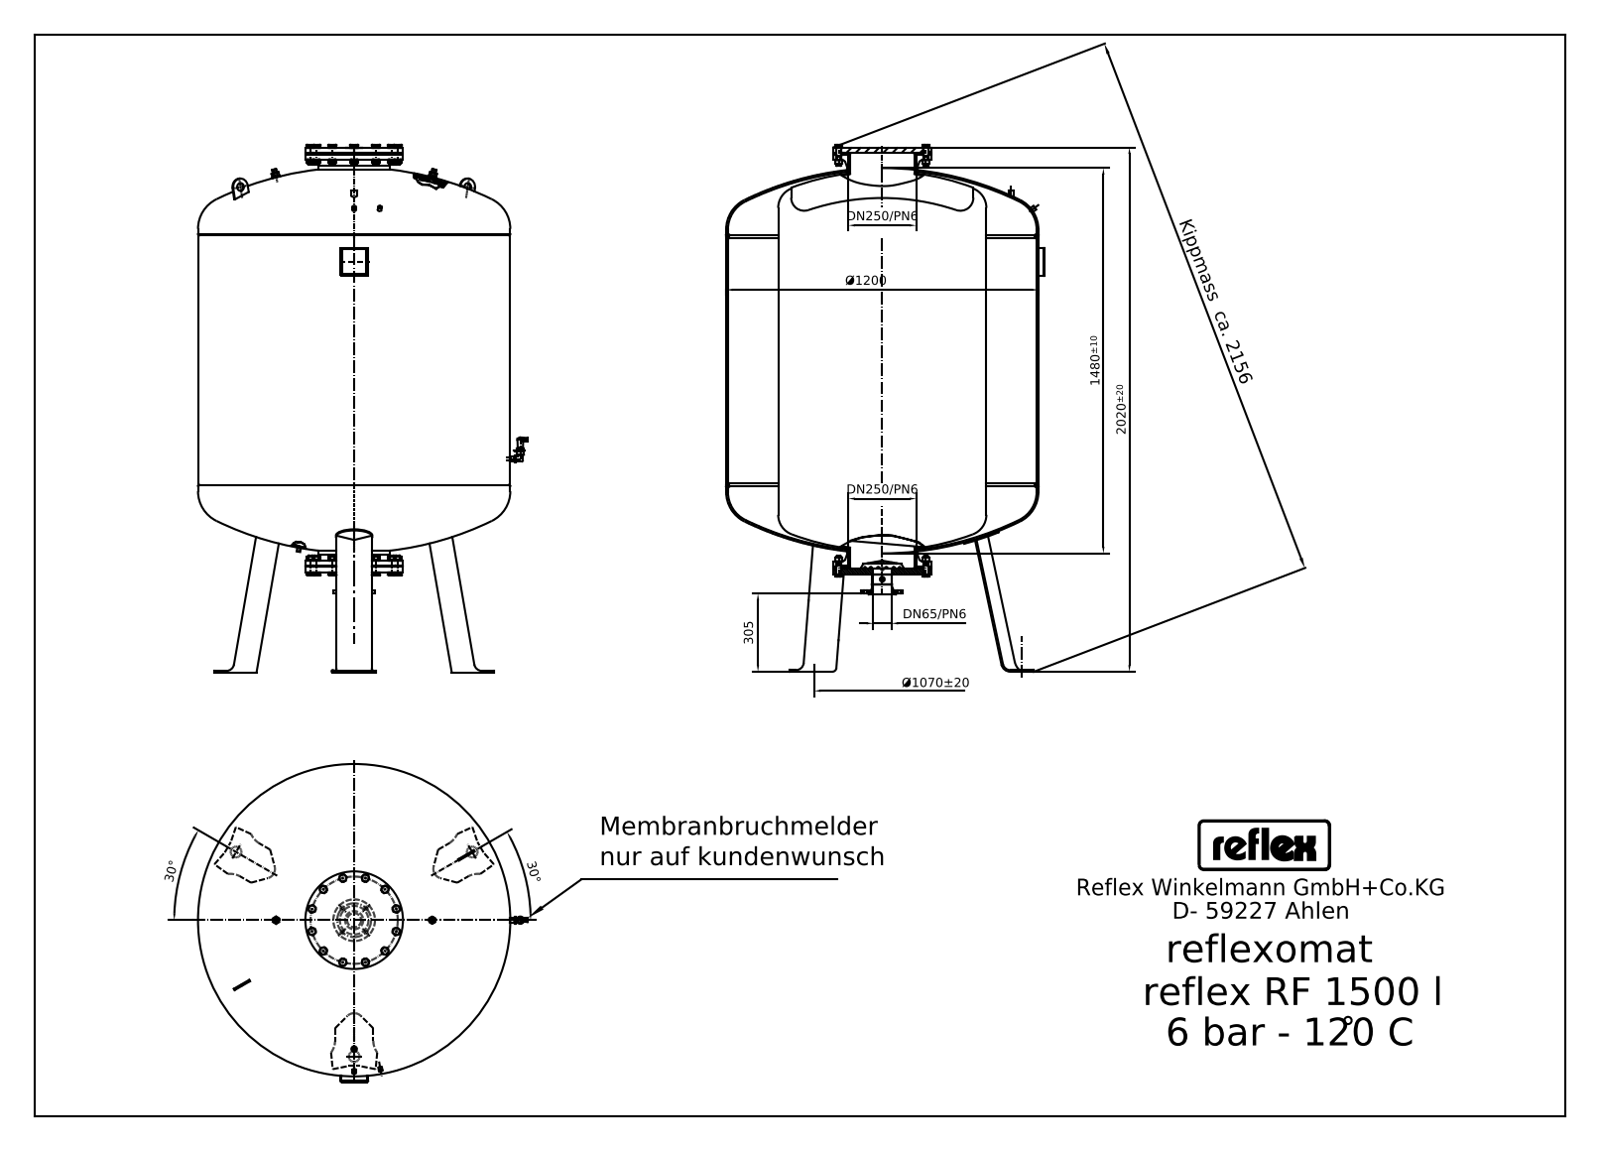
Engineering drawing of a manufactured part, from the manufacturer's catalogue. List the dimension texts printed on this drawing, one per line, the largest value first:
Kippmass ca. 2156
2020±20
1480±10
Ø1200
Ø1070±20
305
DN250/PN6
DN250/PN6
DN65/PN6
30°
30°
